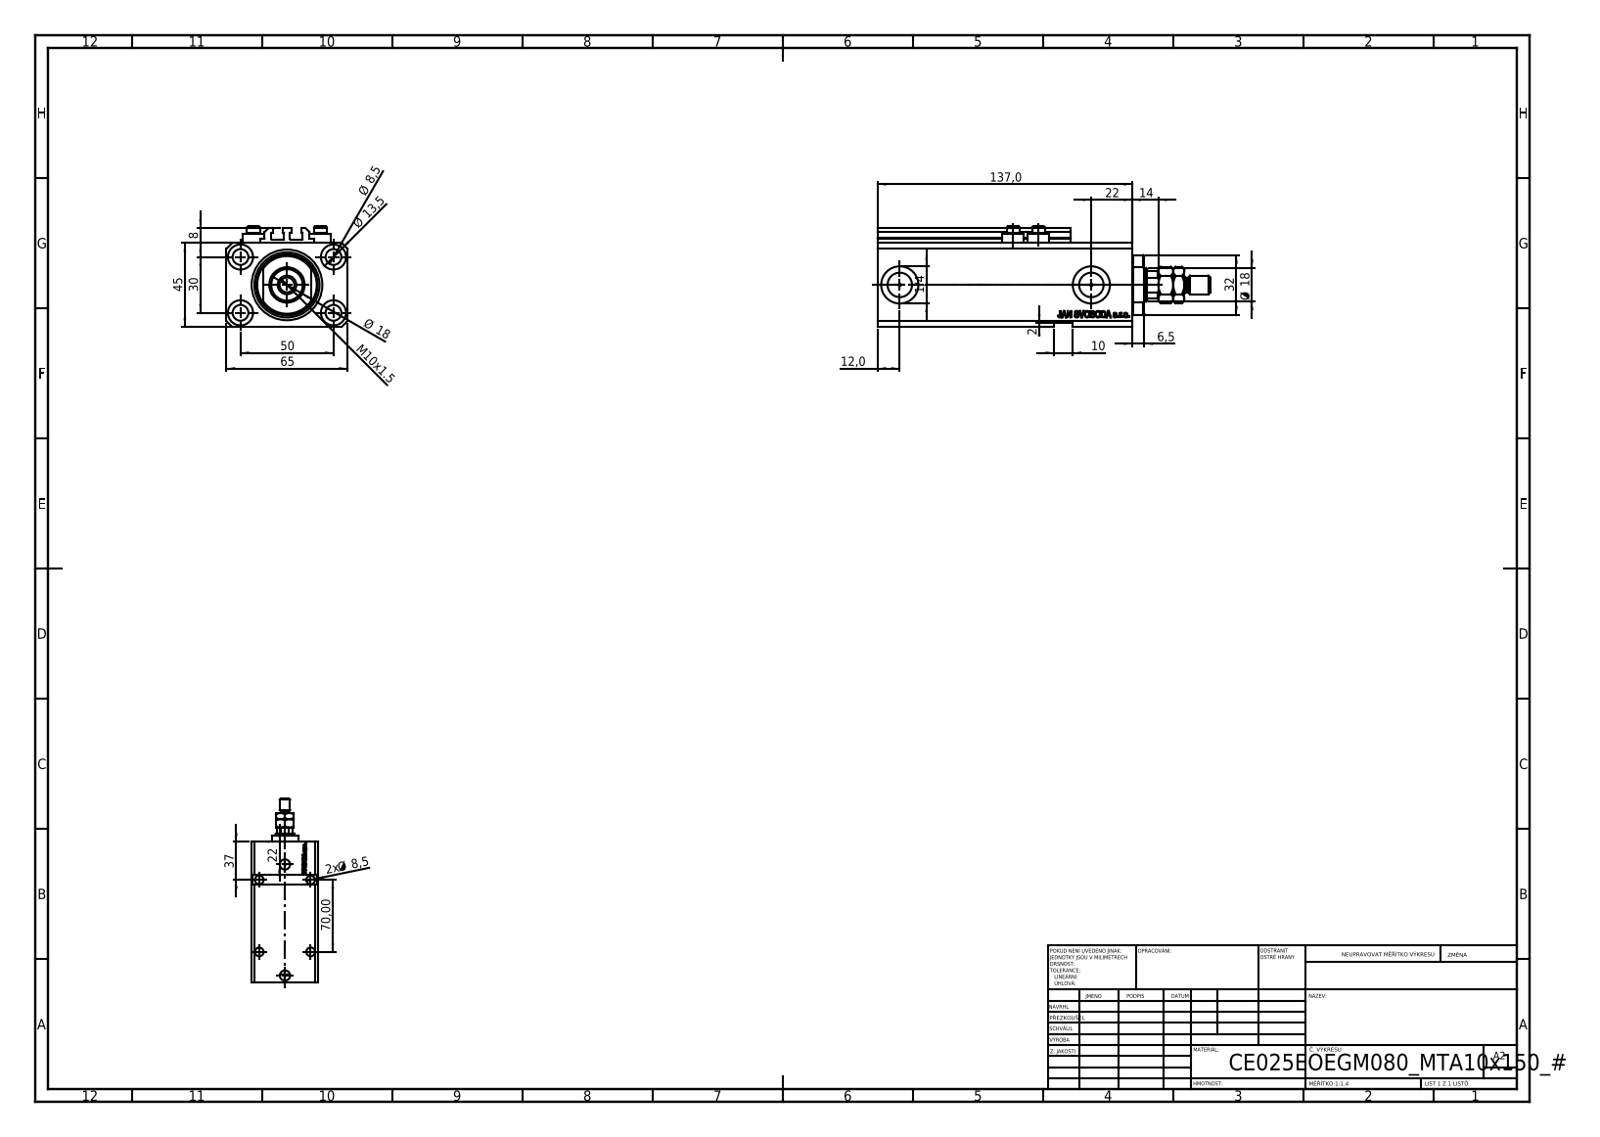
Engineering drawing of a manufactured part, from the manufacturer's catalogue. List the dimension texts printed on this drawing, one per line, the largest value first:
137,0
70,00
65
50
45
37
32
30
22
22
Ø 18
Ø 18
14
Ø 13,5
12,0
M10x1.5
10
Ø 8,5
2x Ø 8,5
8
6,5
2
1/4
